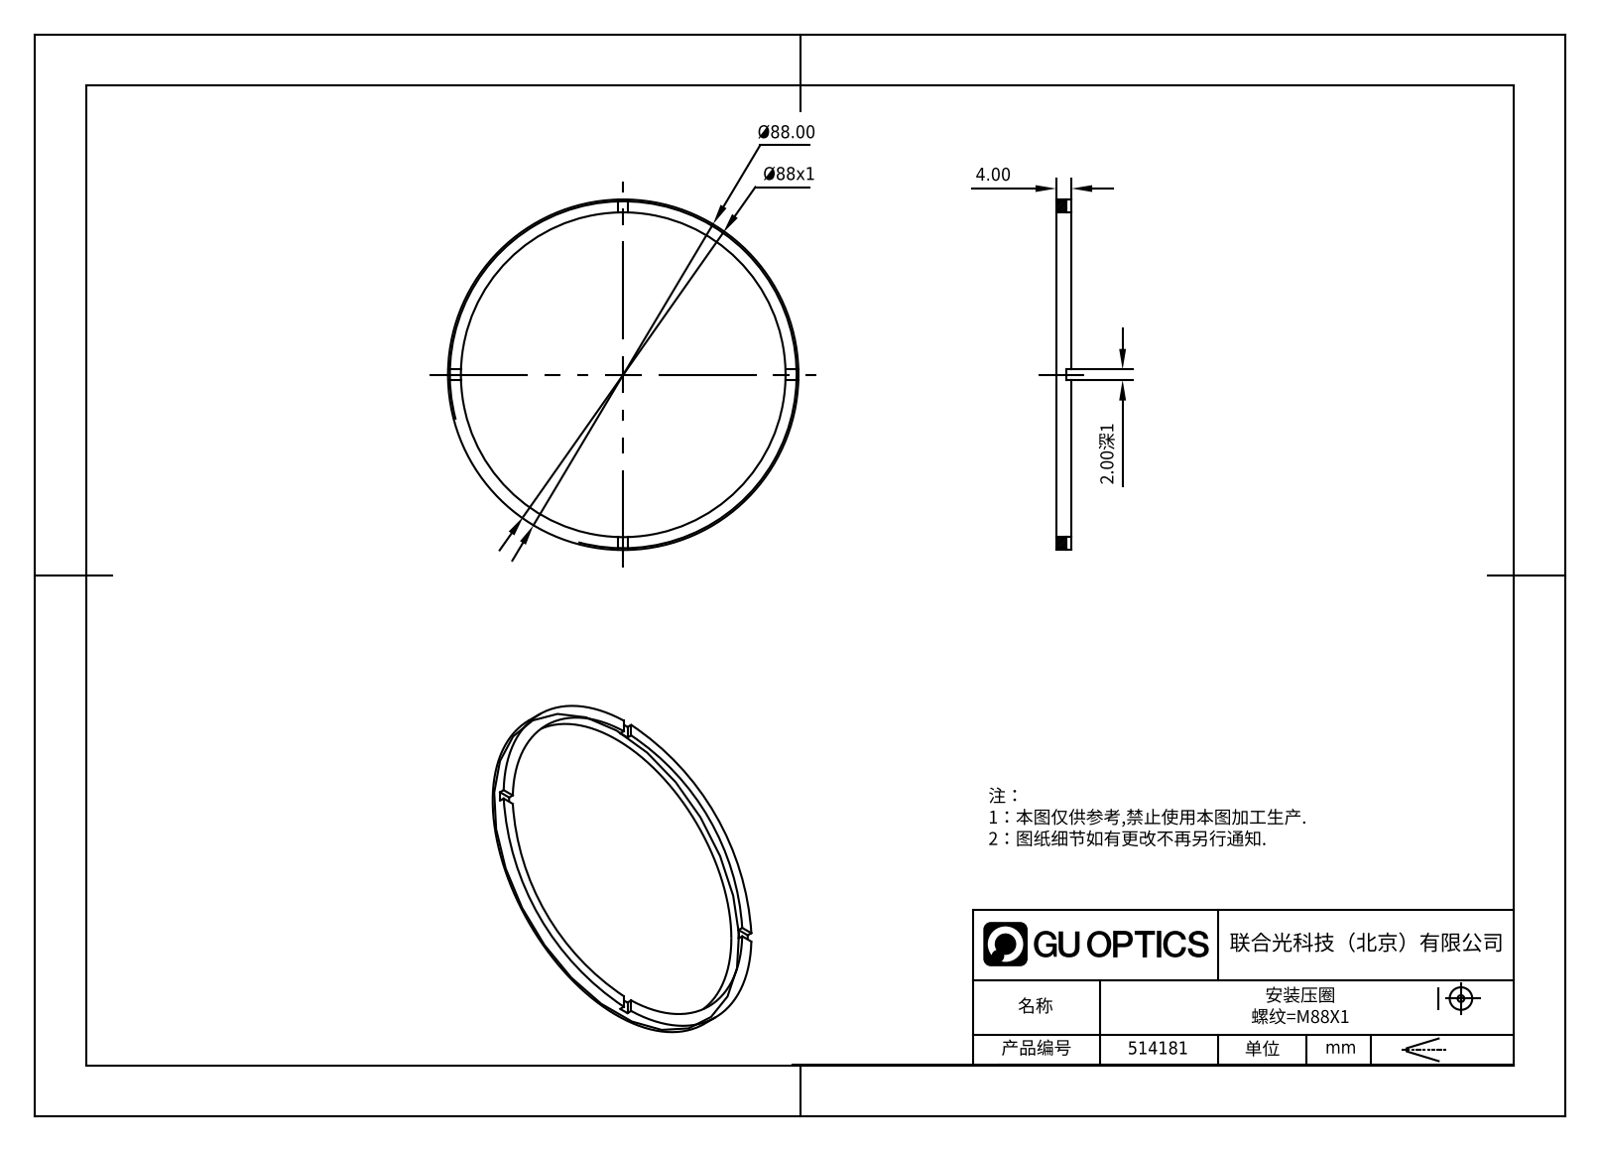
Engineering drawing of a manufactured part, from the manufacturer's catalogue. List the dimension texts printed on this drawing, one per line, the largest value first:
Ø88.00
Ø88x1
4.00
2.00深1
